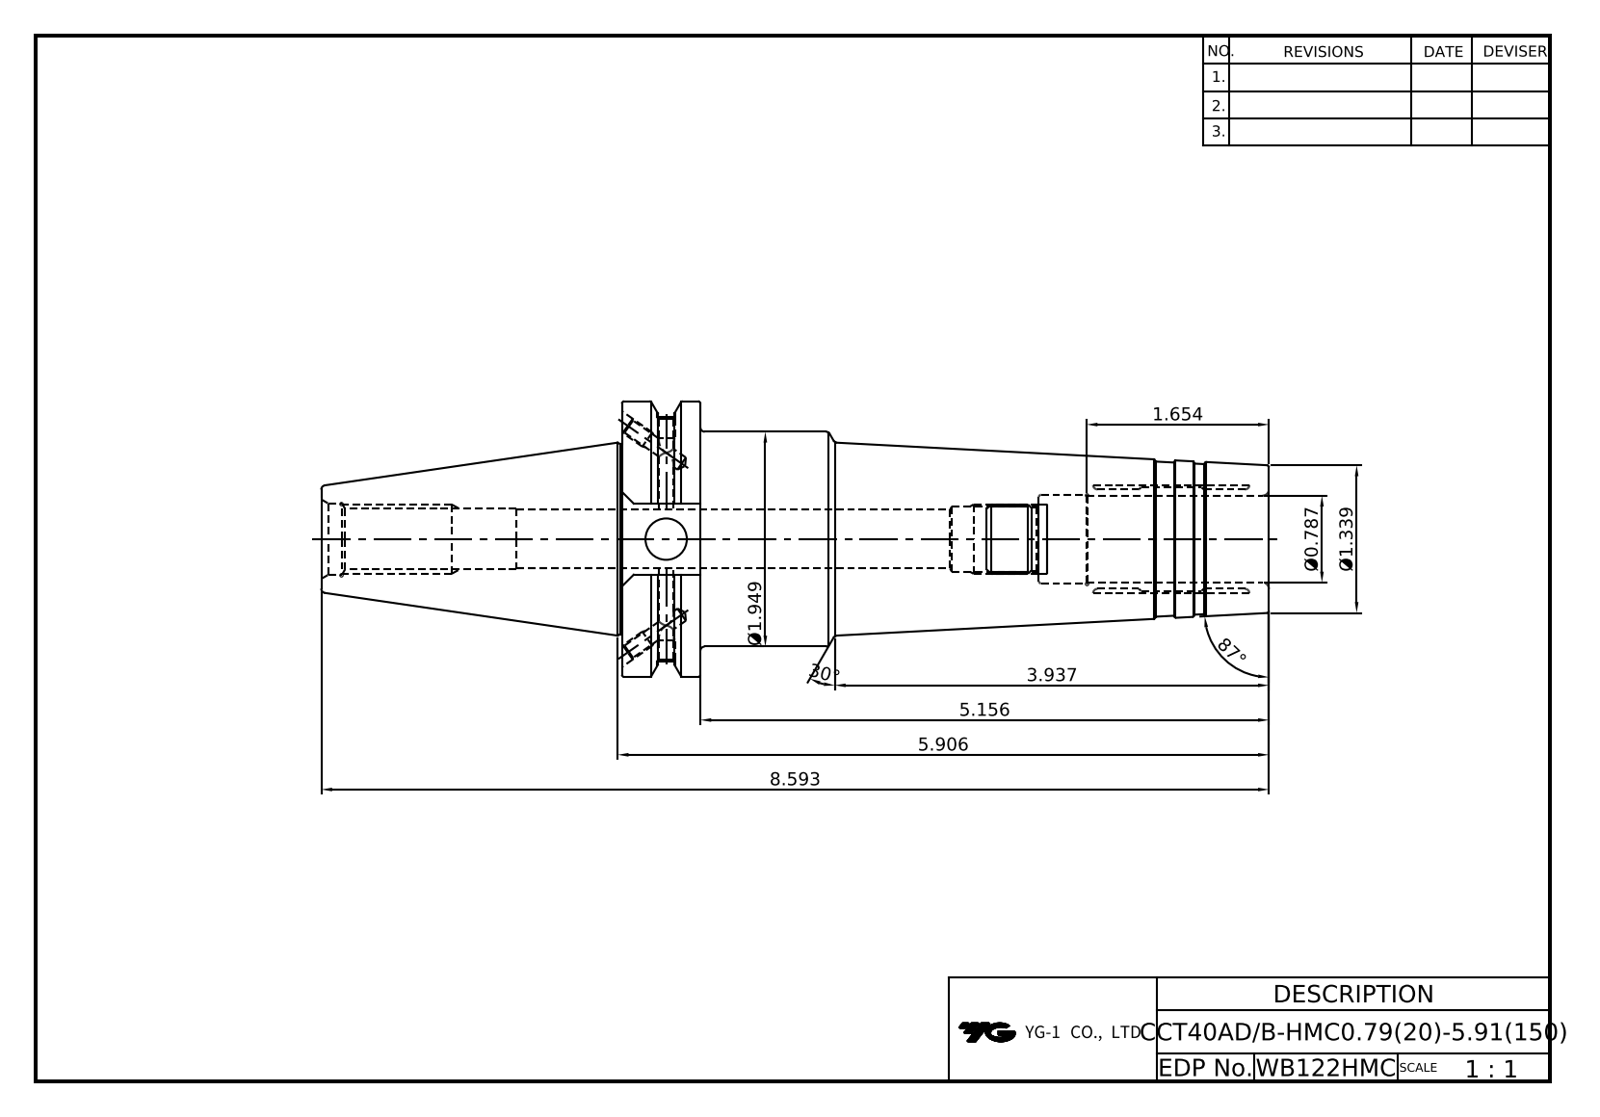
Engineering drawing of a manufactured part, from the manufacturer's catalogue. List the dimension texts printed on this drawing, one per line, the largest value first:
87°
30°
8.593
5.906
5.156
3.937
Ø1.949
1.654
Ø1.339
Ø0.787
